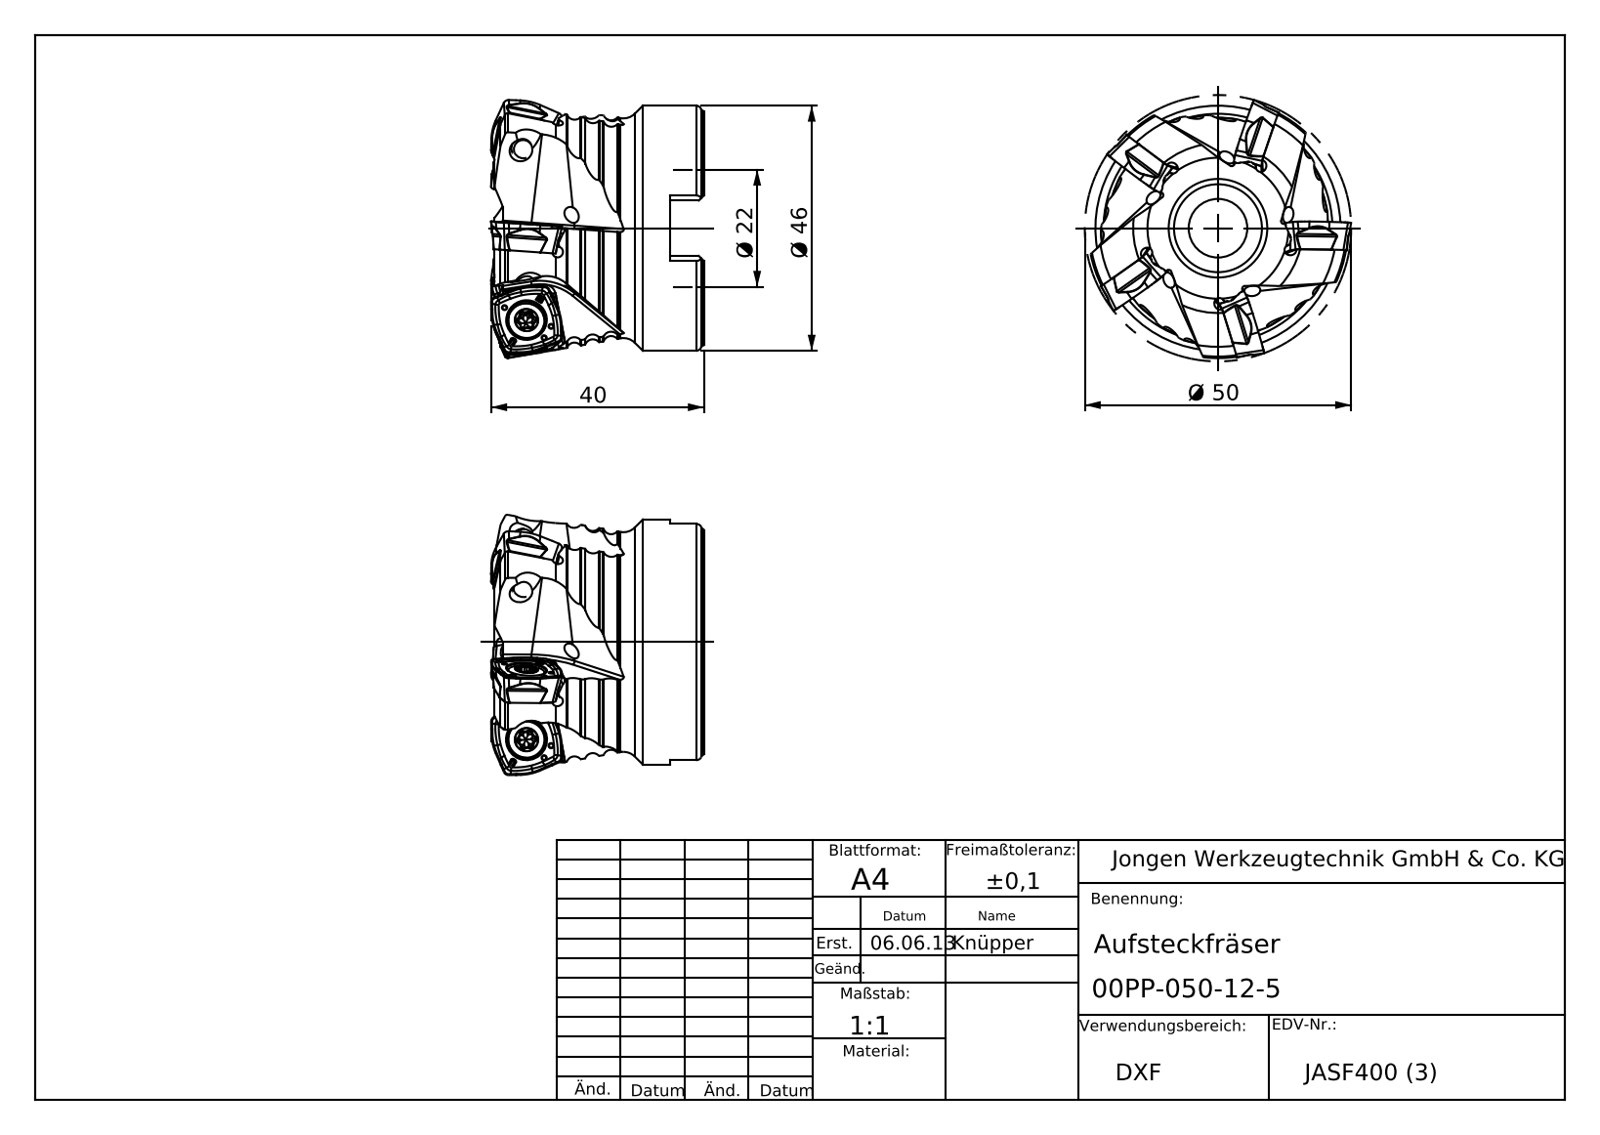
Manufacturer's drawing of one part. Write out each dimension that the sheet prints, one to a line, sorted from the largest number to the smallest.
Ø 50
Ø 46
40
Ø 22
